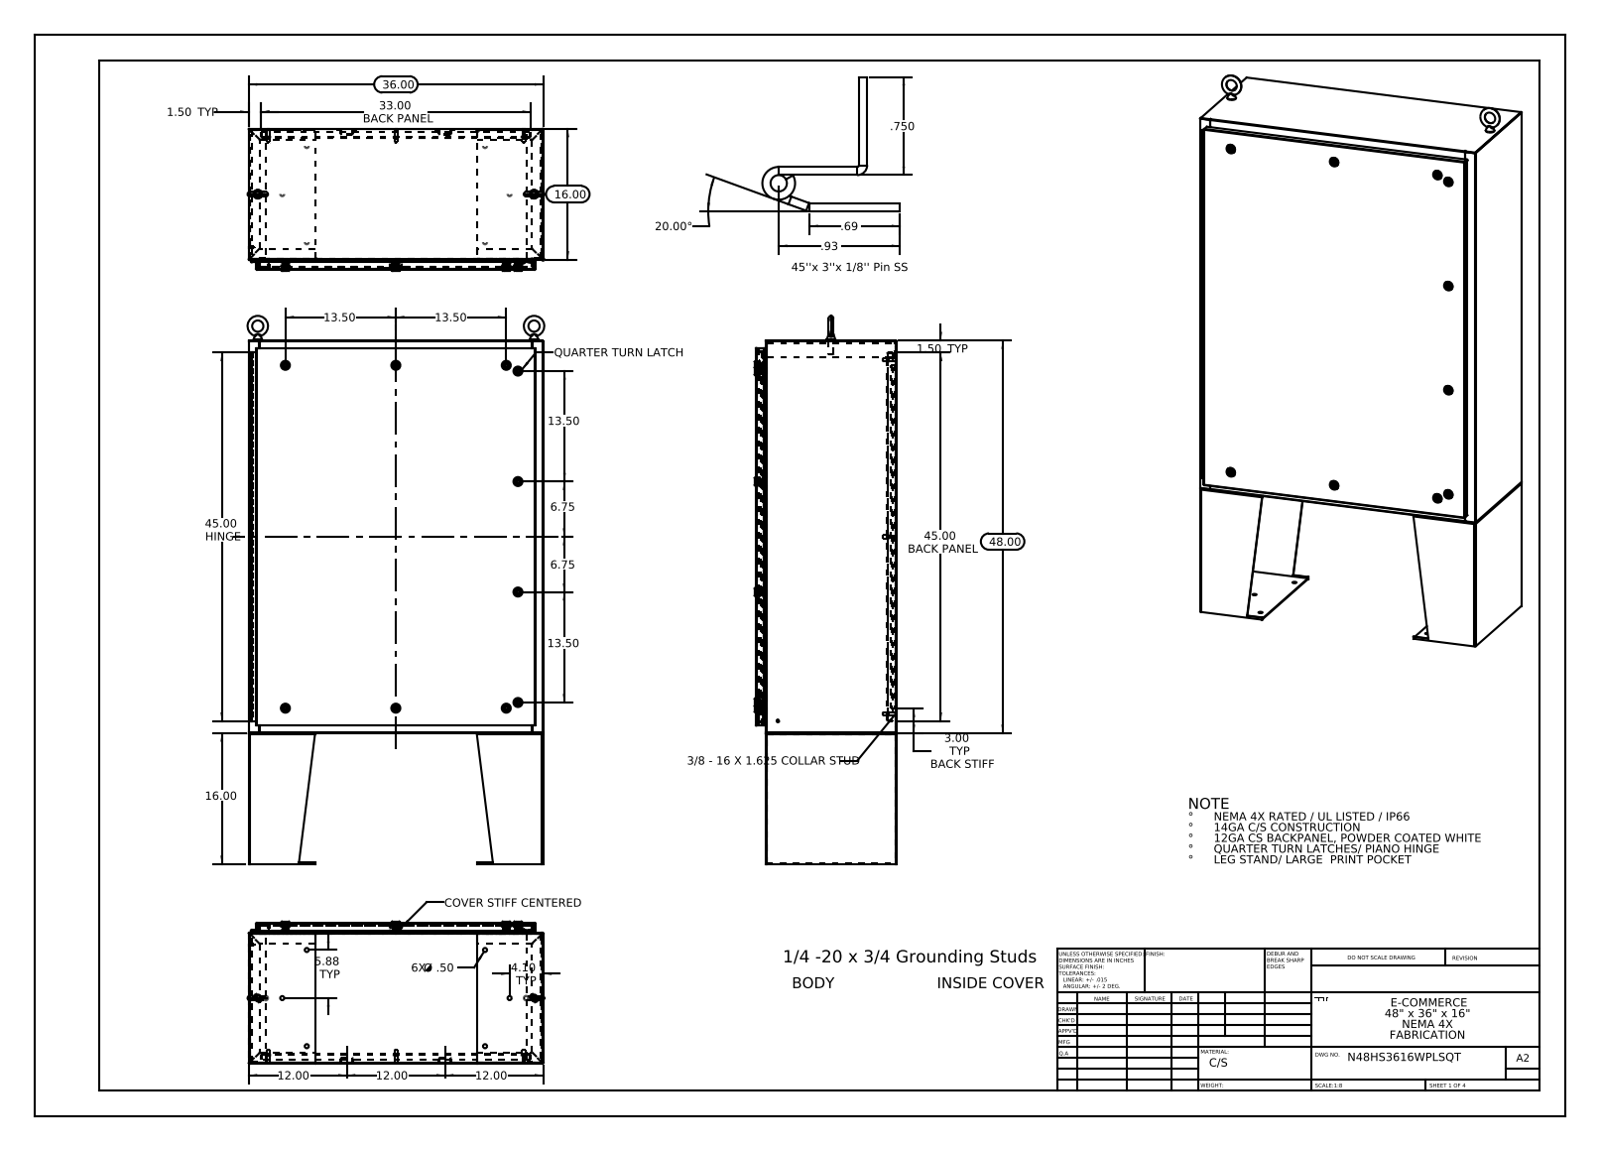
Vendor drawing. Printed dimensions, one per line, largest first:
48.00
45.00 HINGE
45.00 BACK PANEL
36.00
33.00 BACK PANEL
20.00°
16.00
16.00
13.50
13.50
13.50
13.50
12.00
12.00
12.00
6.75
6.75
5.88 TYP
4.10 TYP
3.00 TYP BACK STIFF
1.50 TYP
1.50 TYP
.93
.750
.69
6X Ø .50
